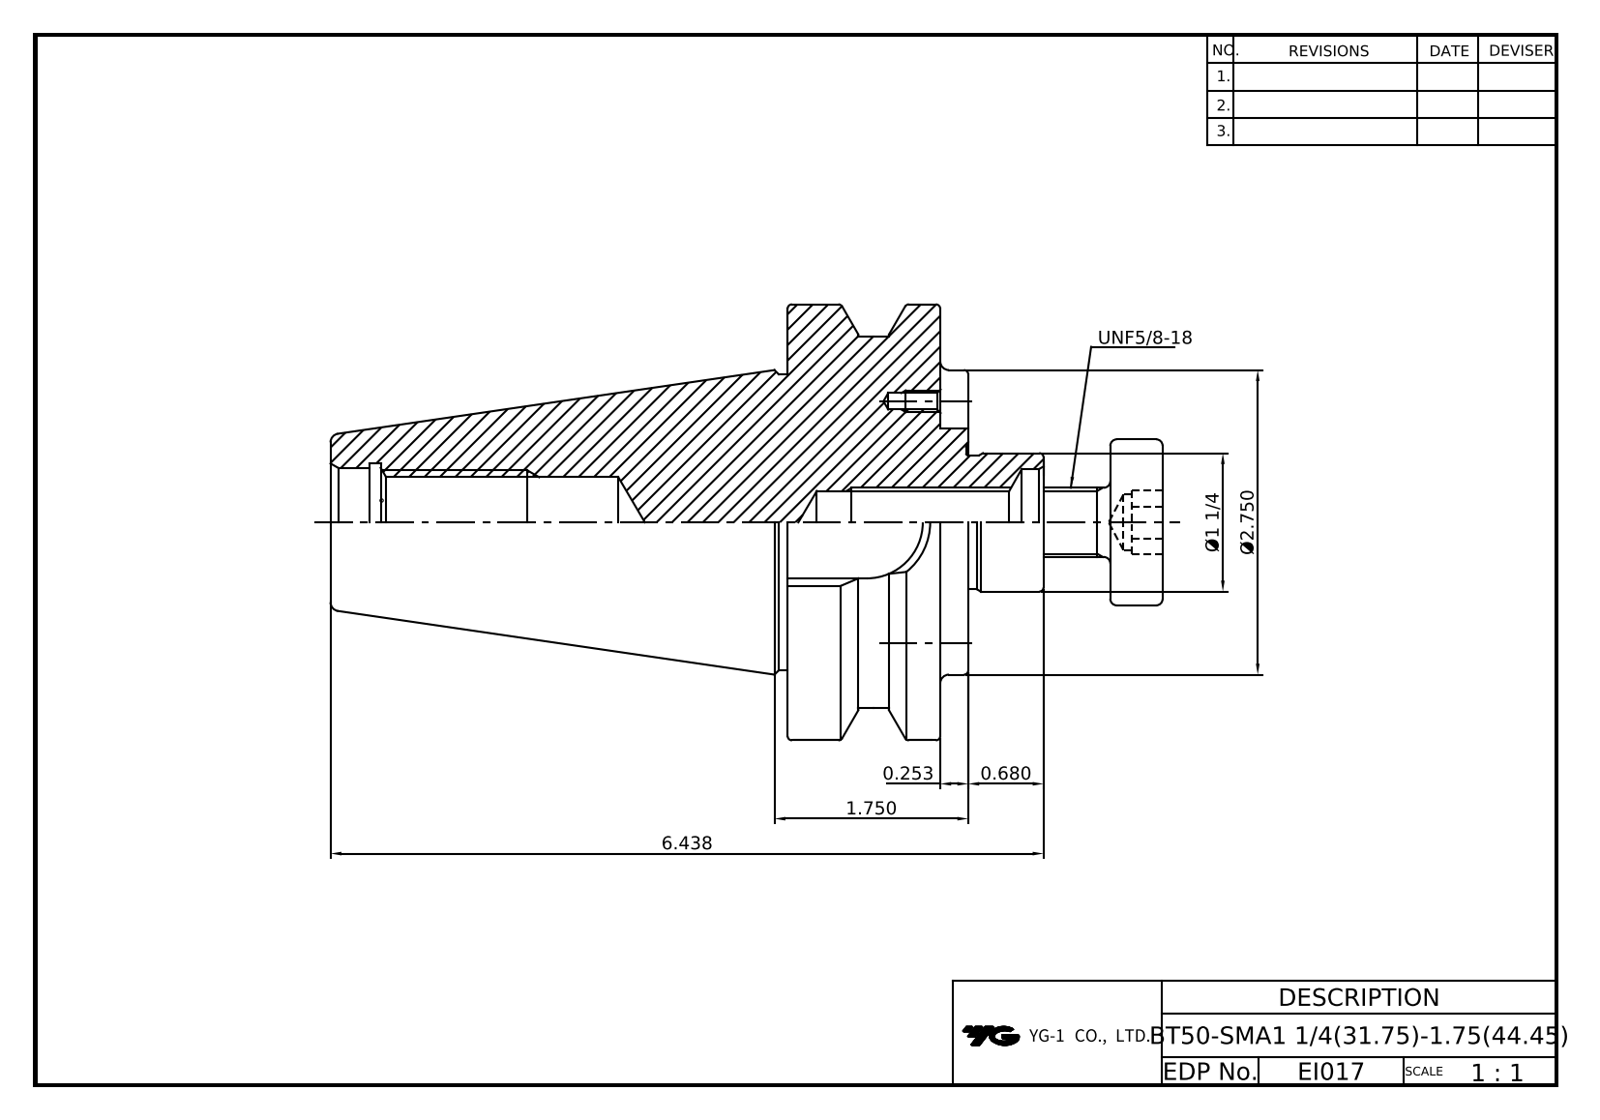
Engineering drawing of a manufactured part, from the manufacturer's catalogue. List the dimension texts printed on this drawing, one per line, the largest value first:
6.438
Ø2.750
1.750
Ø1 1/4
0.680
0.253
